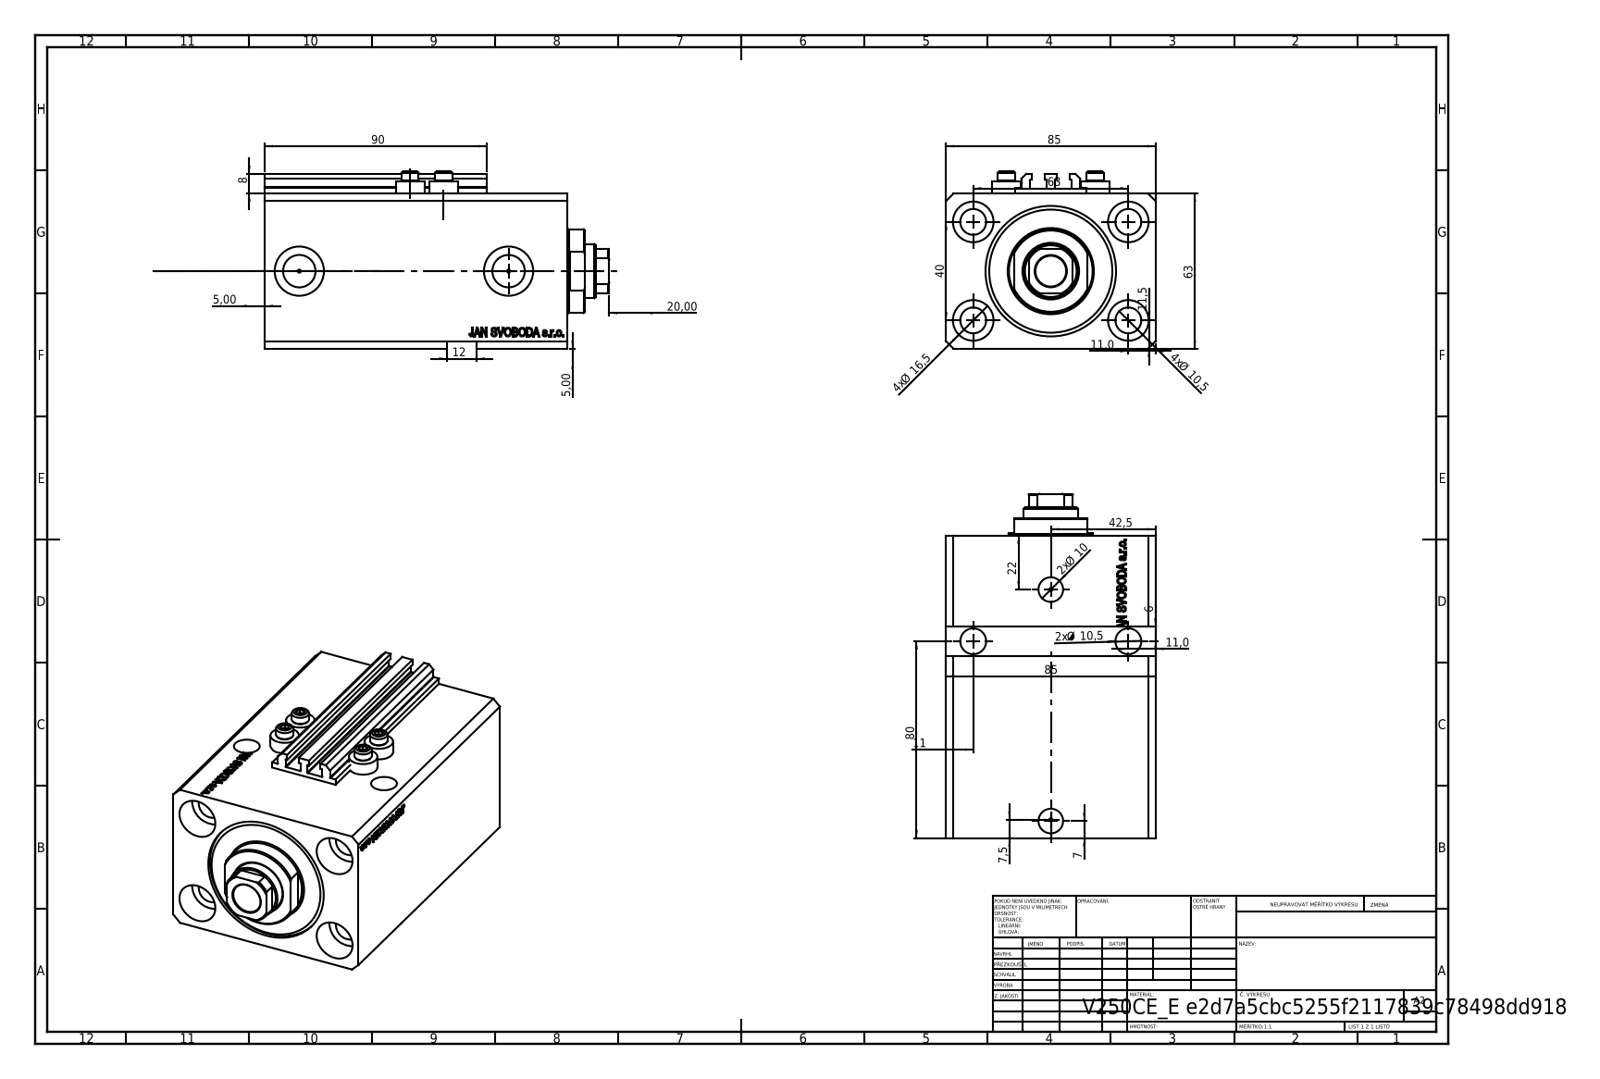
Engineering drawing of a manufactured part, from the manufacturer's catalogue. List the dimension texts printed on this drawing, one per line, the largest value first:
90
85
85
80
63
63
42,5
40
22
20,00
4x Ø 16,5
12
11,5
11,0
11,0
11
4x Ø 10,5
2x Ø 10,5
2x Ø 10
8
7,5
7
6
5,00
5,00
